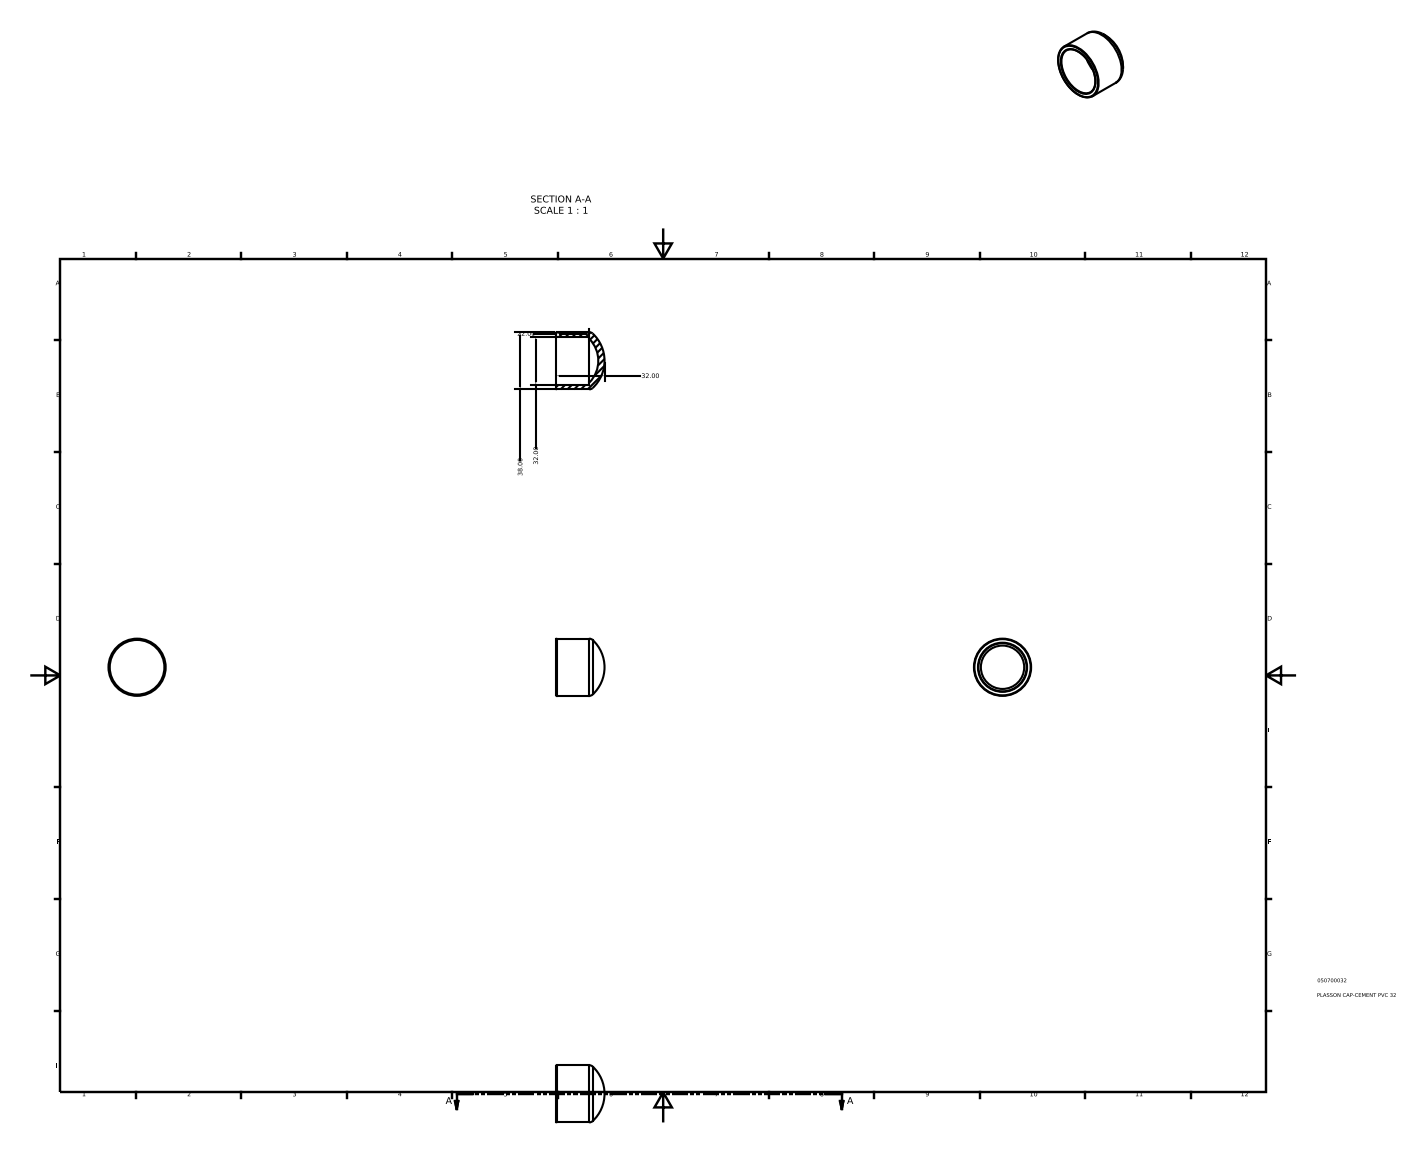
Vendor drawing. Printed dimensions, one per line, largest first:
38.00
32.00
32.00
22.00
